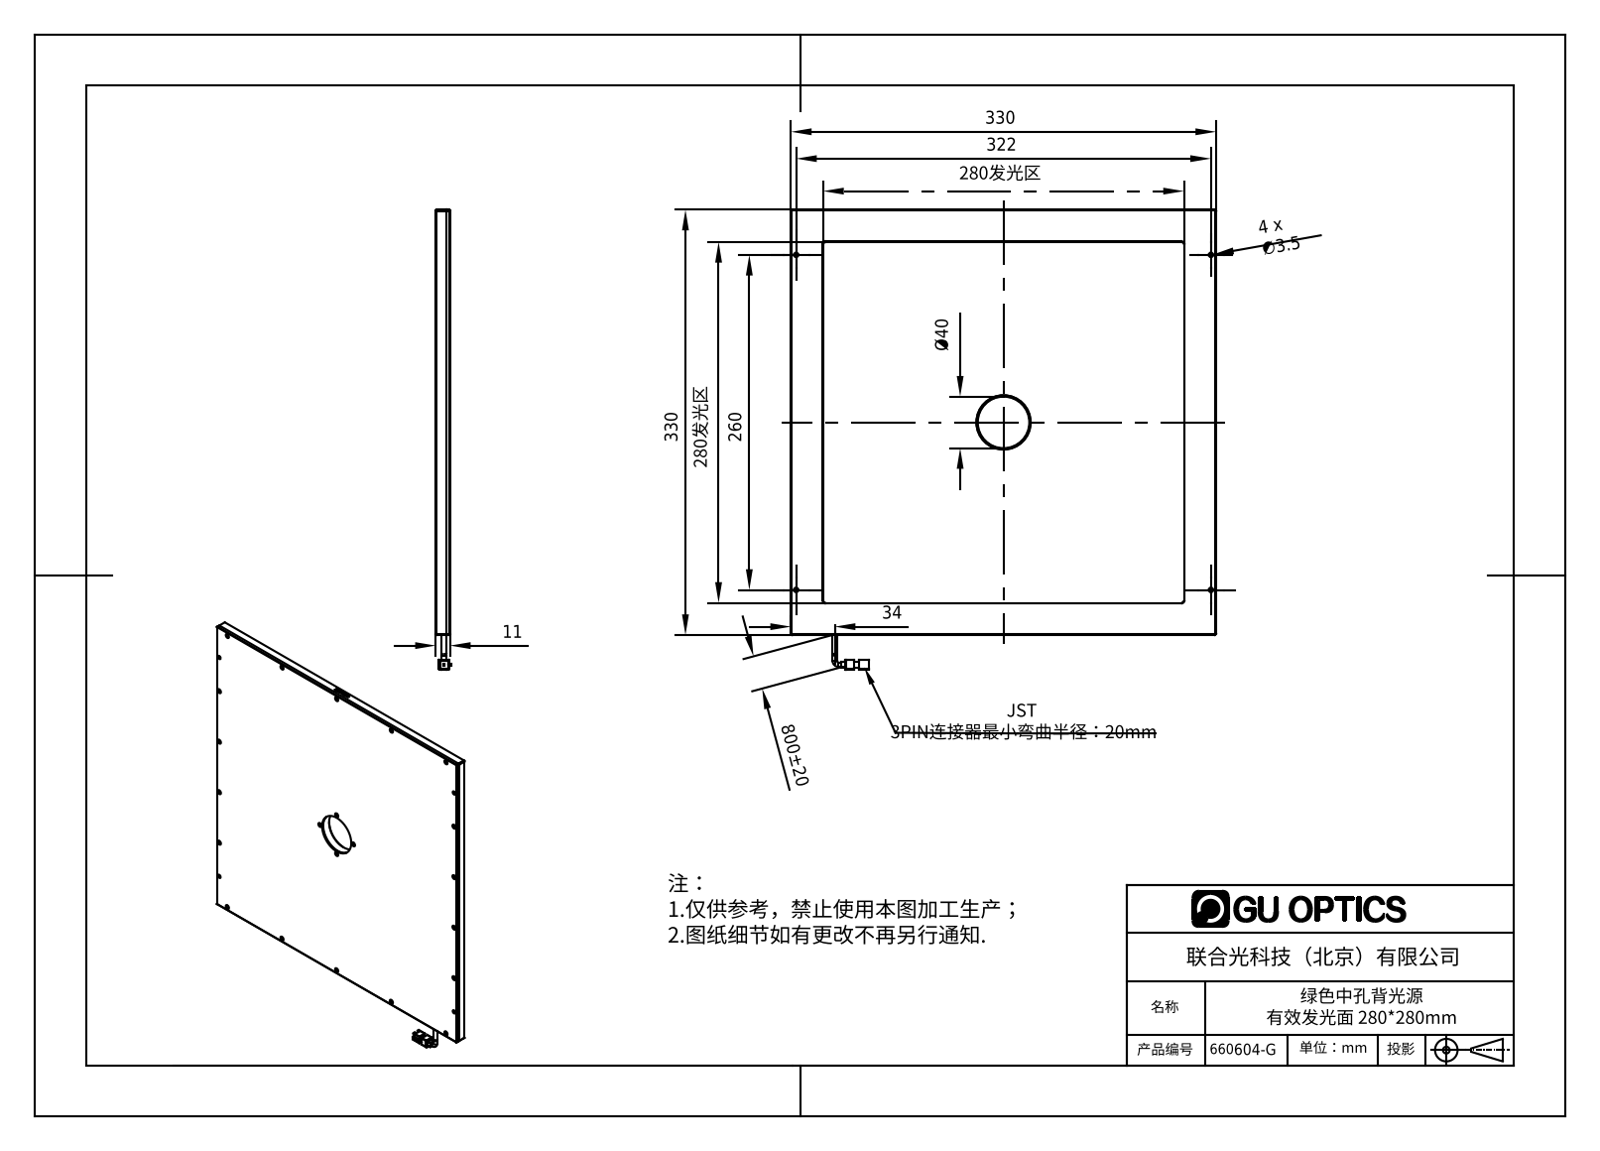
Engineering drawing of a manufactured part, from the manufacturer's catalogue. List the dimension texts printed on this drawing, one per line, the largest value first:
800±20
330
330
322
280发光区
280发光区
260
Ø40
34
11
4 x ∅3.5
